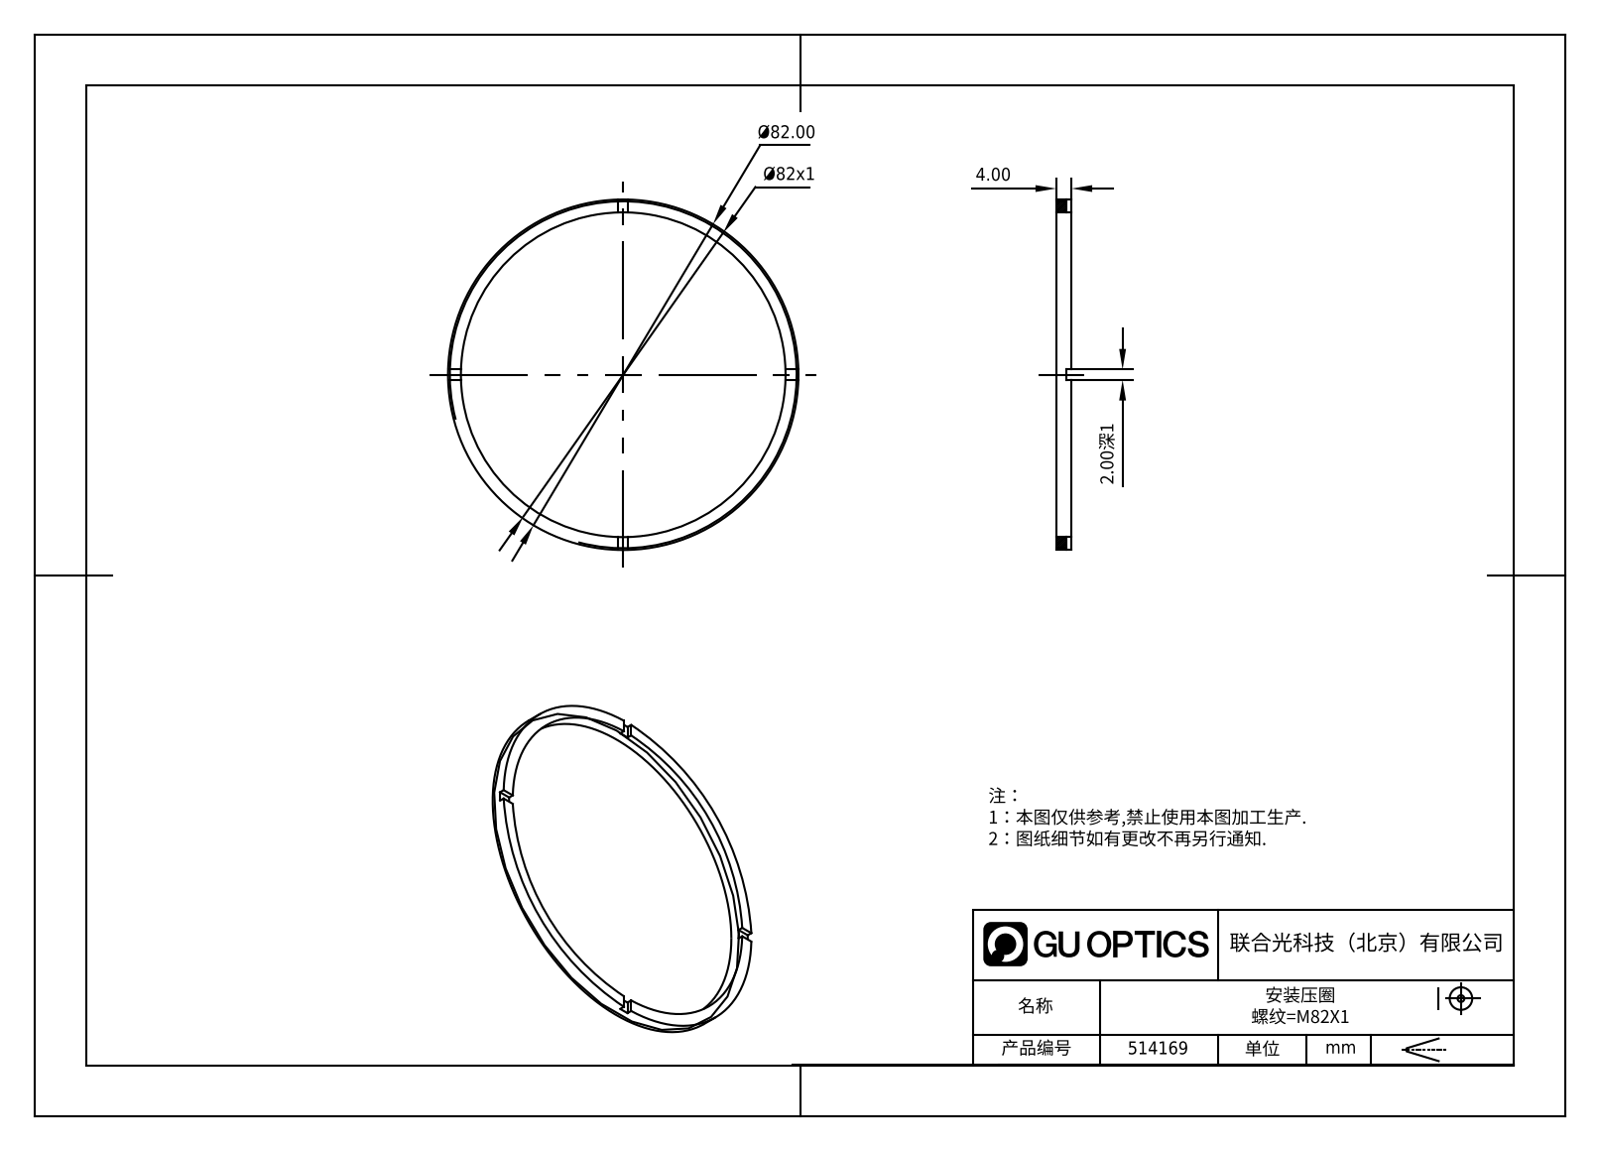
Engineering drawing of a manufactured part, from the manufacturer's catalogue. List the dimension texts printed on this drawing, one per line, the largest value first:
Ø82.00
Ø82x1
4.00
2.00深1
